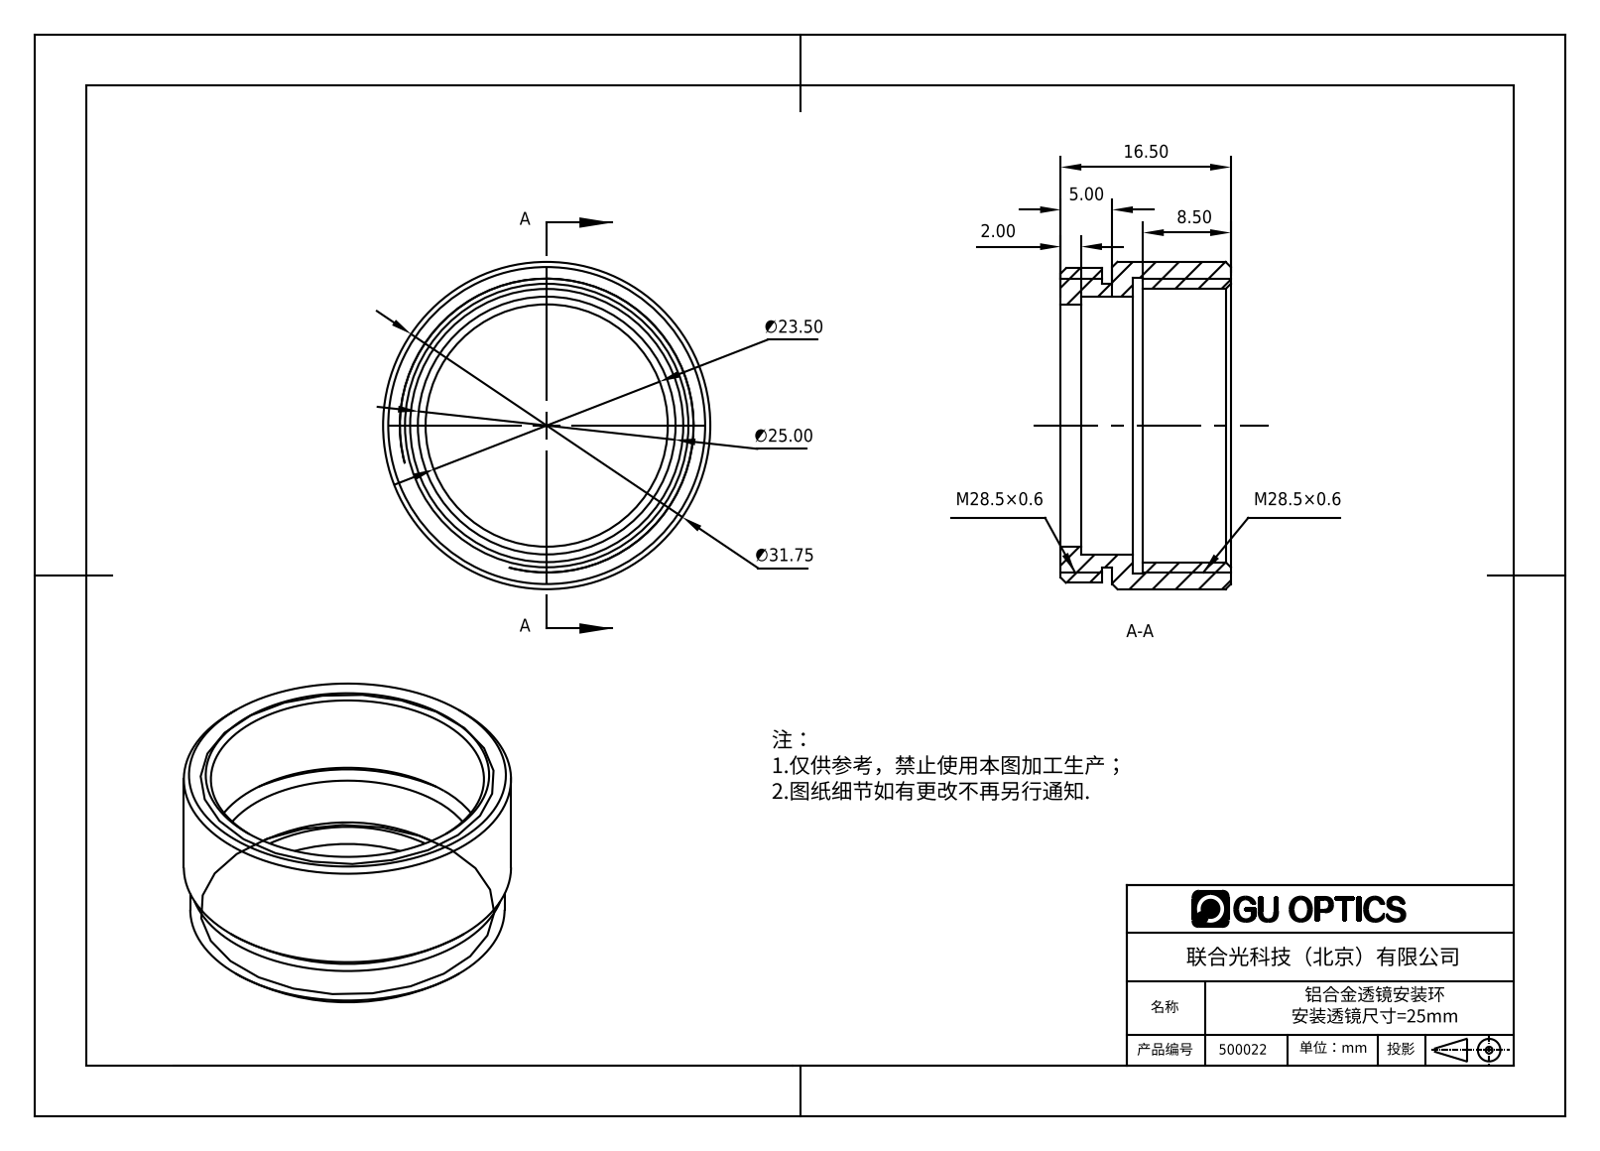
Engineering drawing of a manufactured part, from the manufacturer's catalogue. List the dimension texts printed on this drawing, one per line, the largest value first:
∅31.75
∅25.00
∅23.50
16.50
8.50
5.00
2.00
